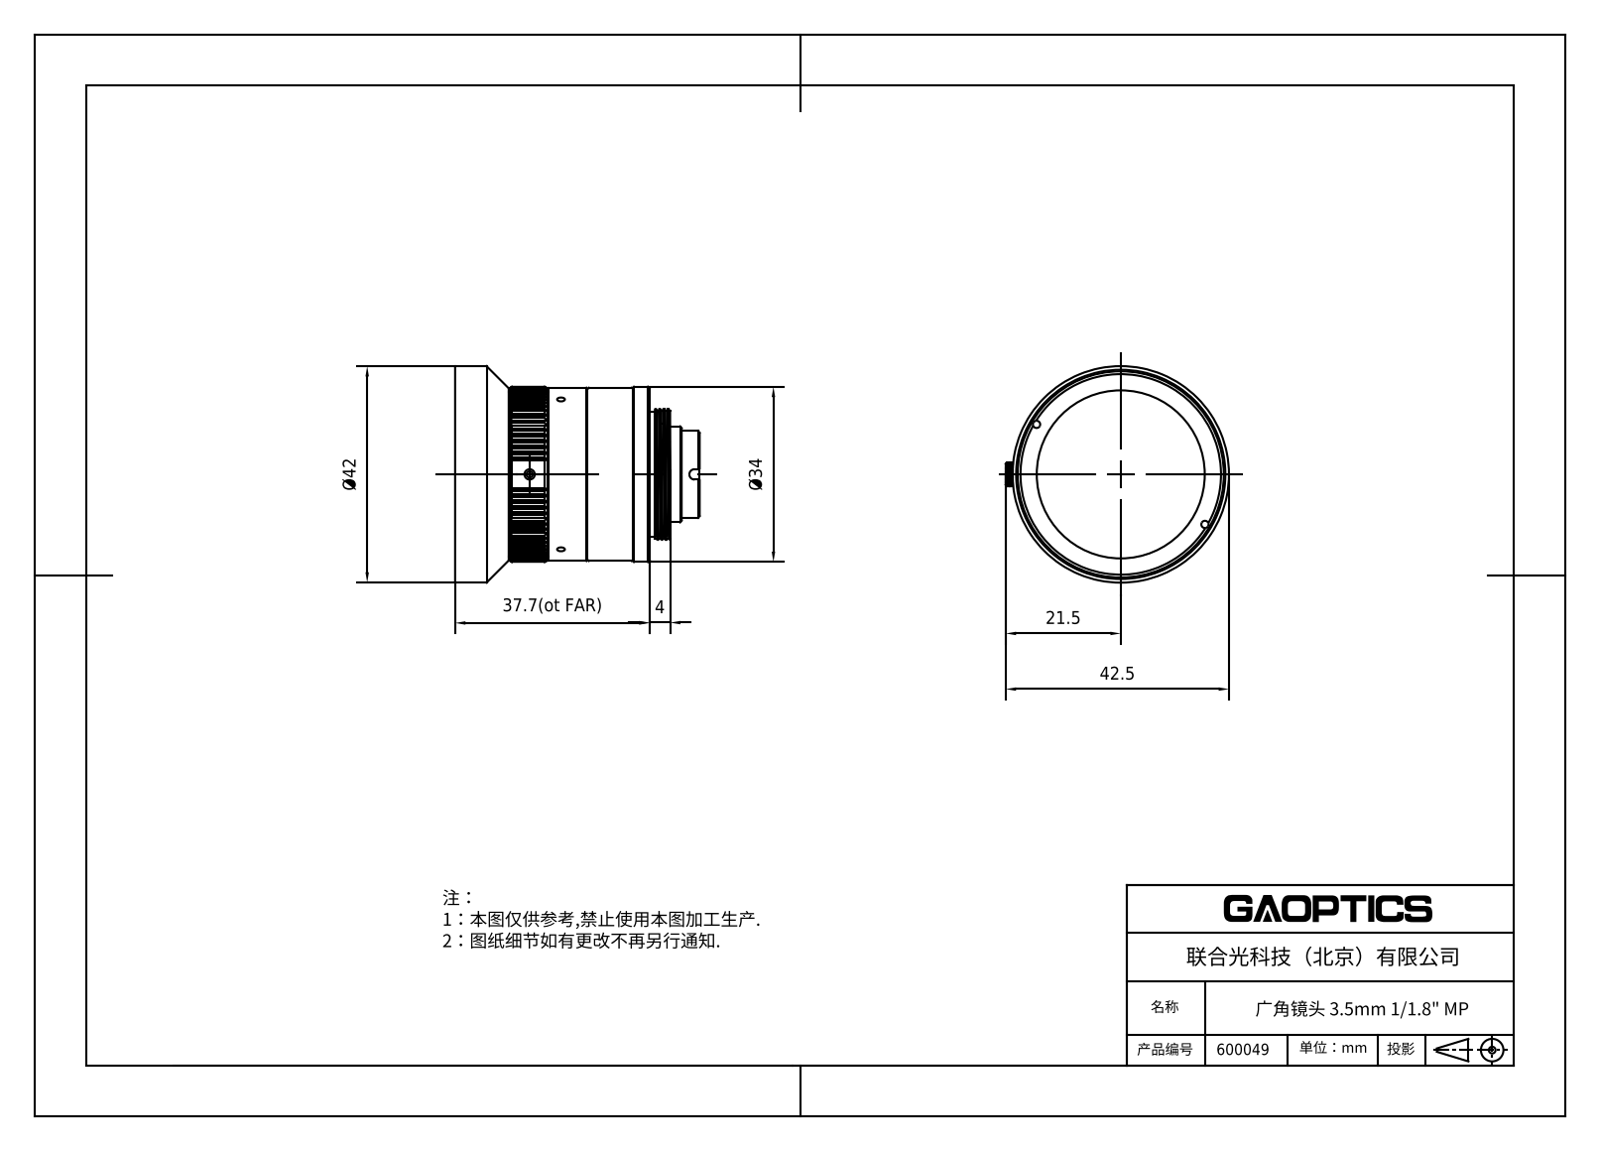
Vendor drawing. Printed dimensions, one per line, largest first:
42.5
Ø42
37.7(ot FAR)
Ø34
21.5
4
